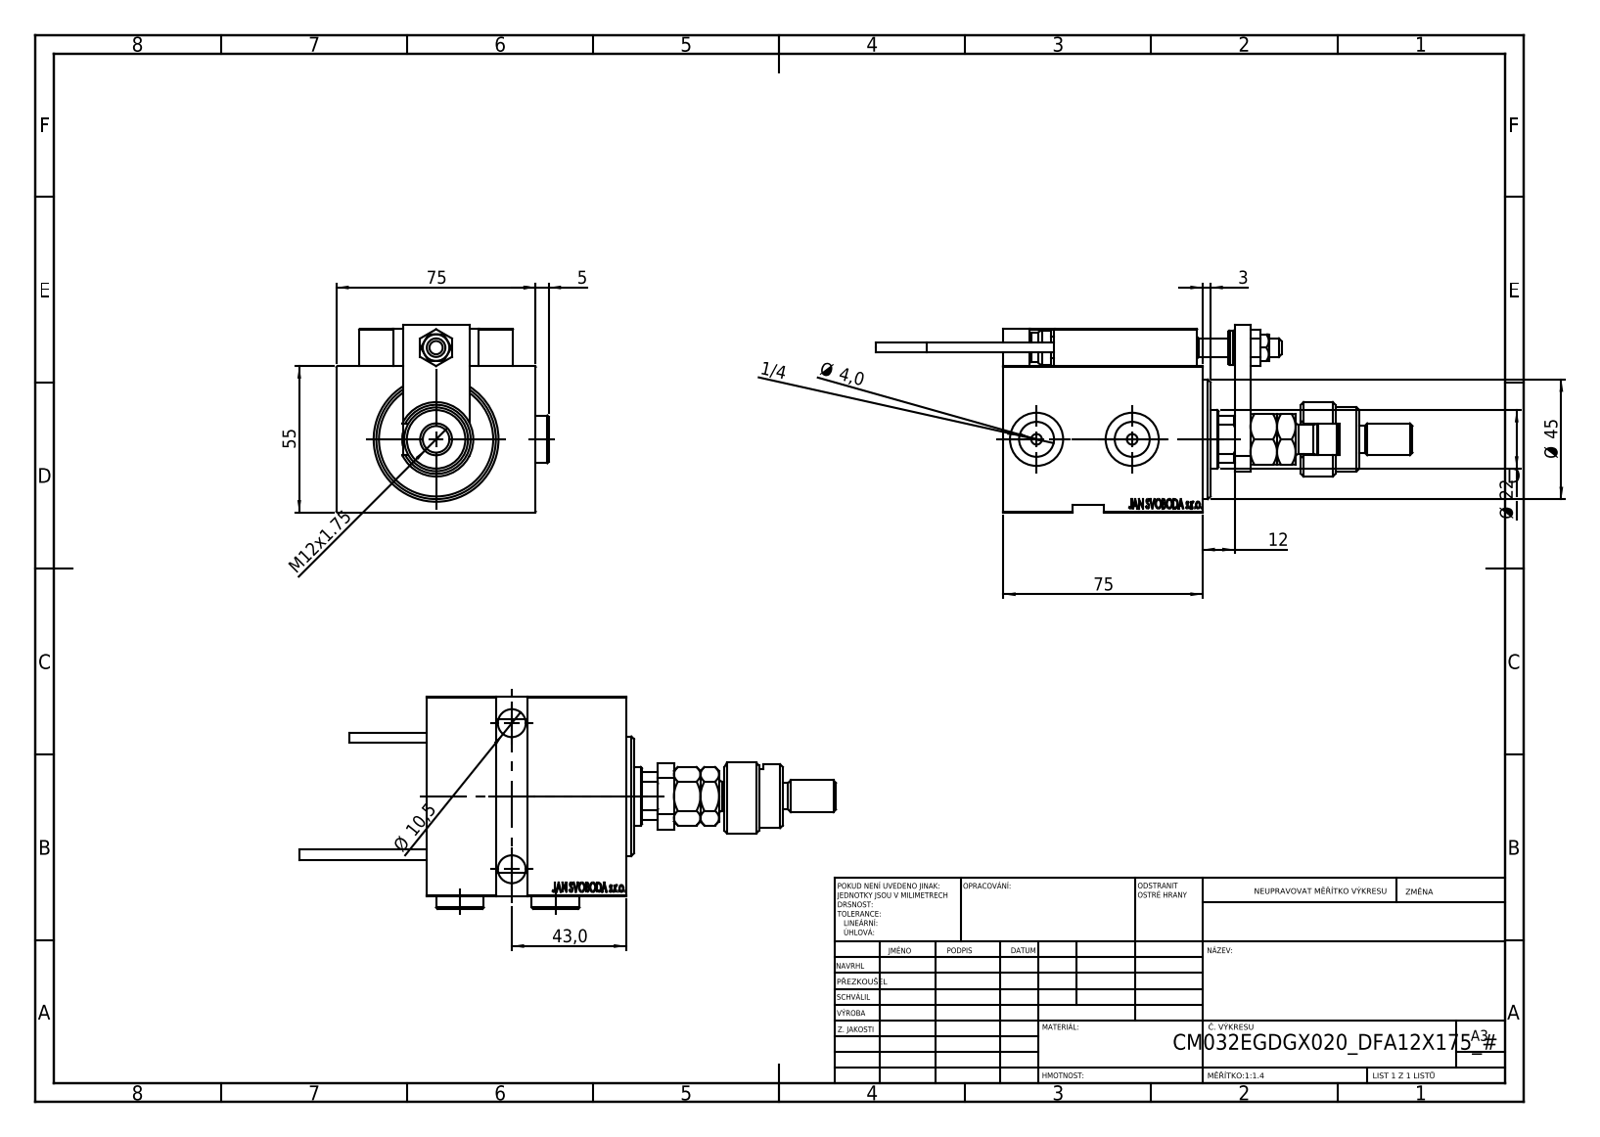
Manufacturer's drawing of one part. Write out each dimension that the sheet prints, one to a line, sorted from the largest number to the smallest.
75
75
55
Ø 45
43,0
Ø 22
M12x1.75
12
Ø 10,5
5
Ø 4,0
3
1/4
